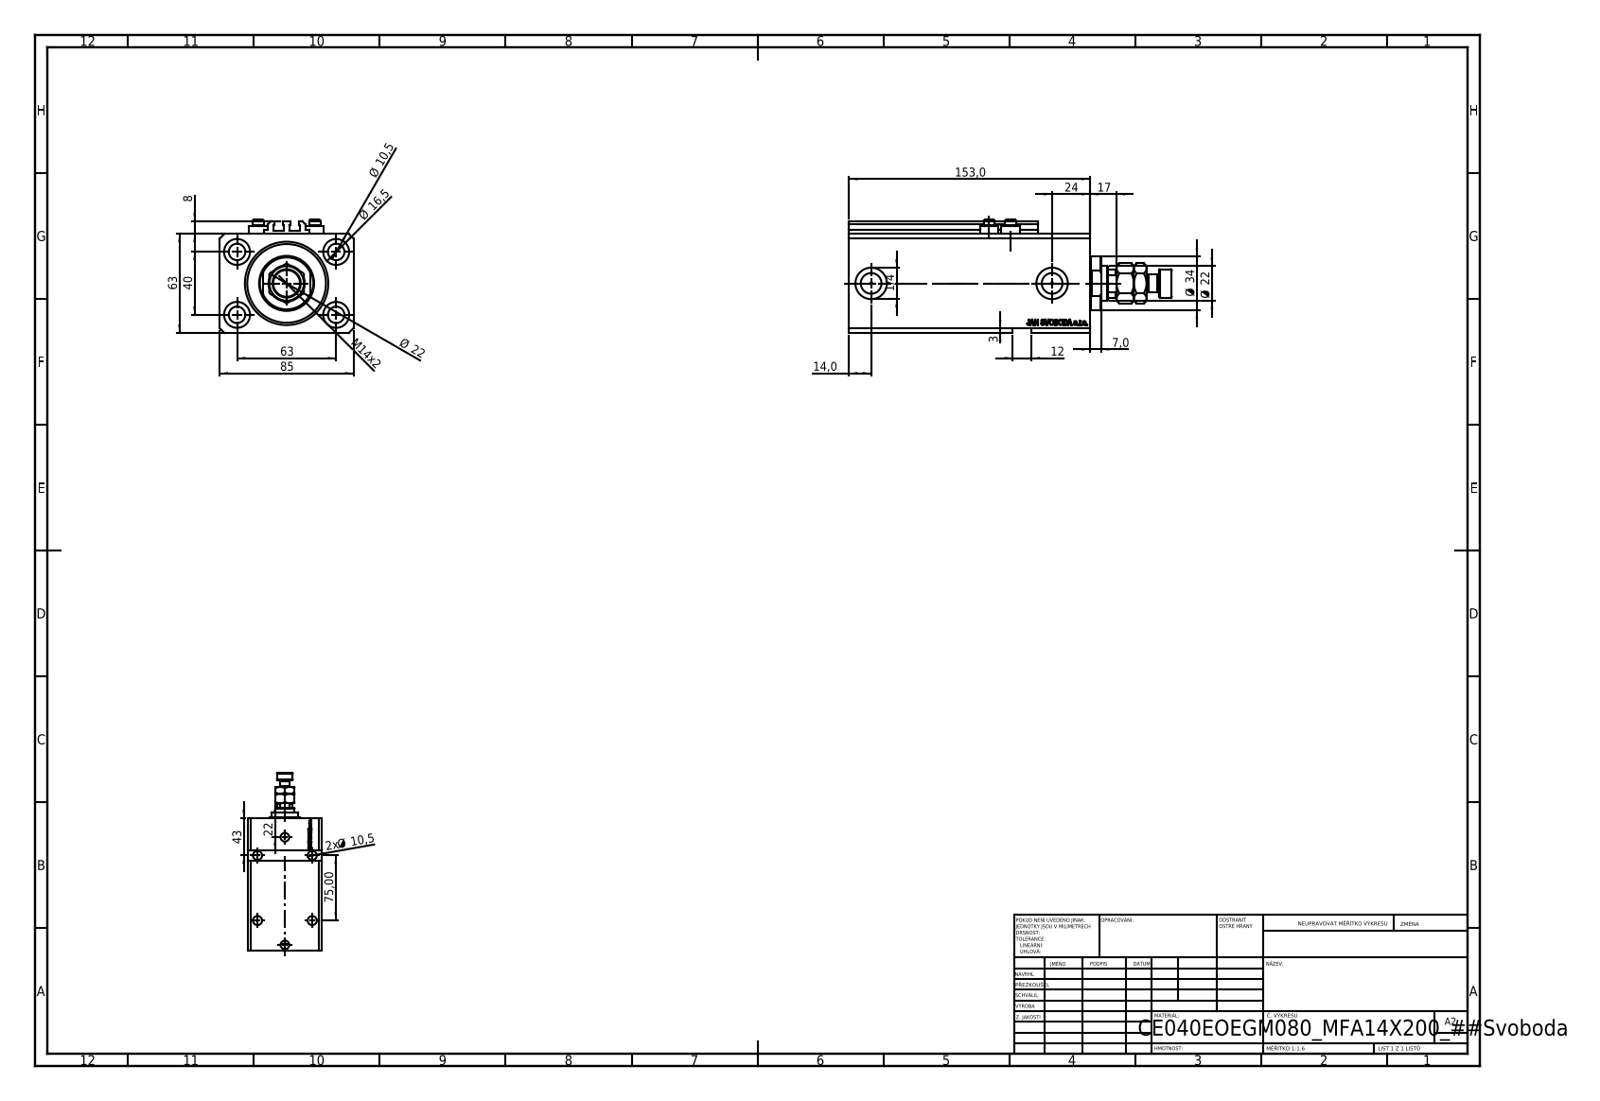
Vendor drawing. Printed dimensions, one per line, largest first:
153,0
85
75,00
63
63
43
40
Ø 34
24
Ø 22
Ø 22
22
17
Ø 16,5
M14x2
14,0
12
Ø 10,5
2x Ø 10,5
8
7,0
3
1/4
